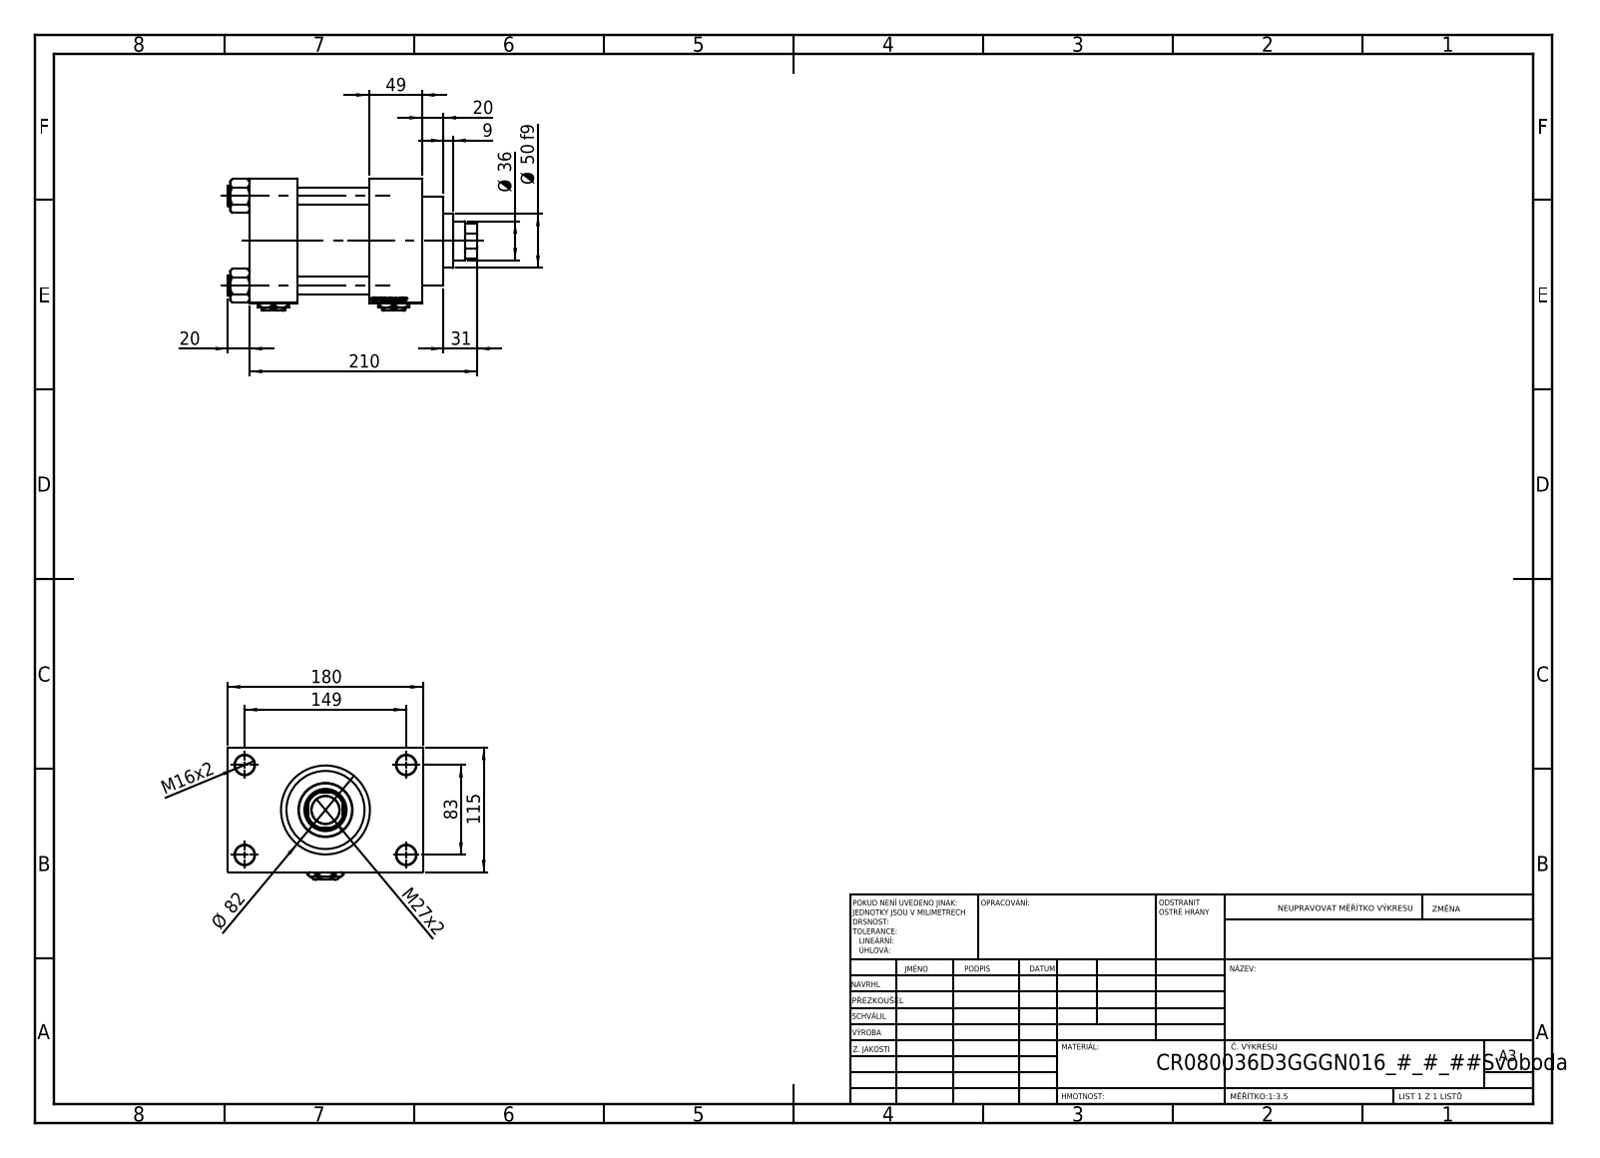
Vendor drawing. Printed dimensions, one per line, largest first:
210
180
149
115
83
Ø 82
Ø 50 f9
49
Ø 36
31
M27x2
20
20
M16x2
9
